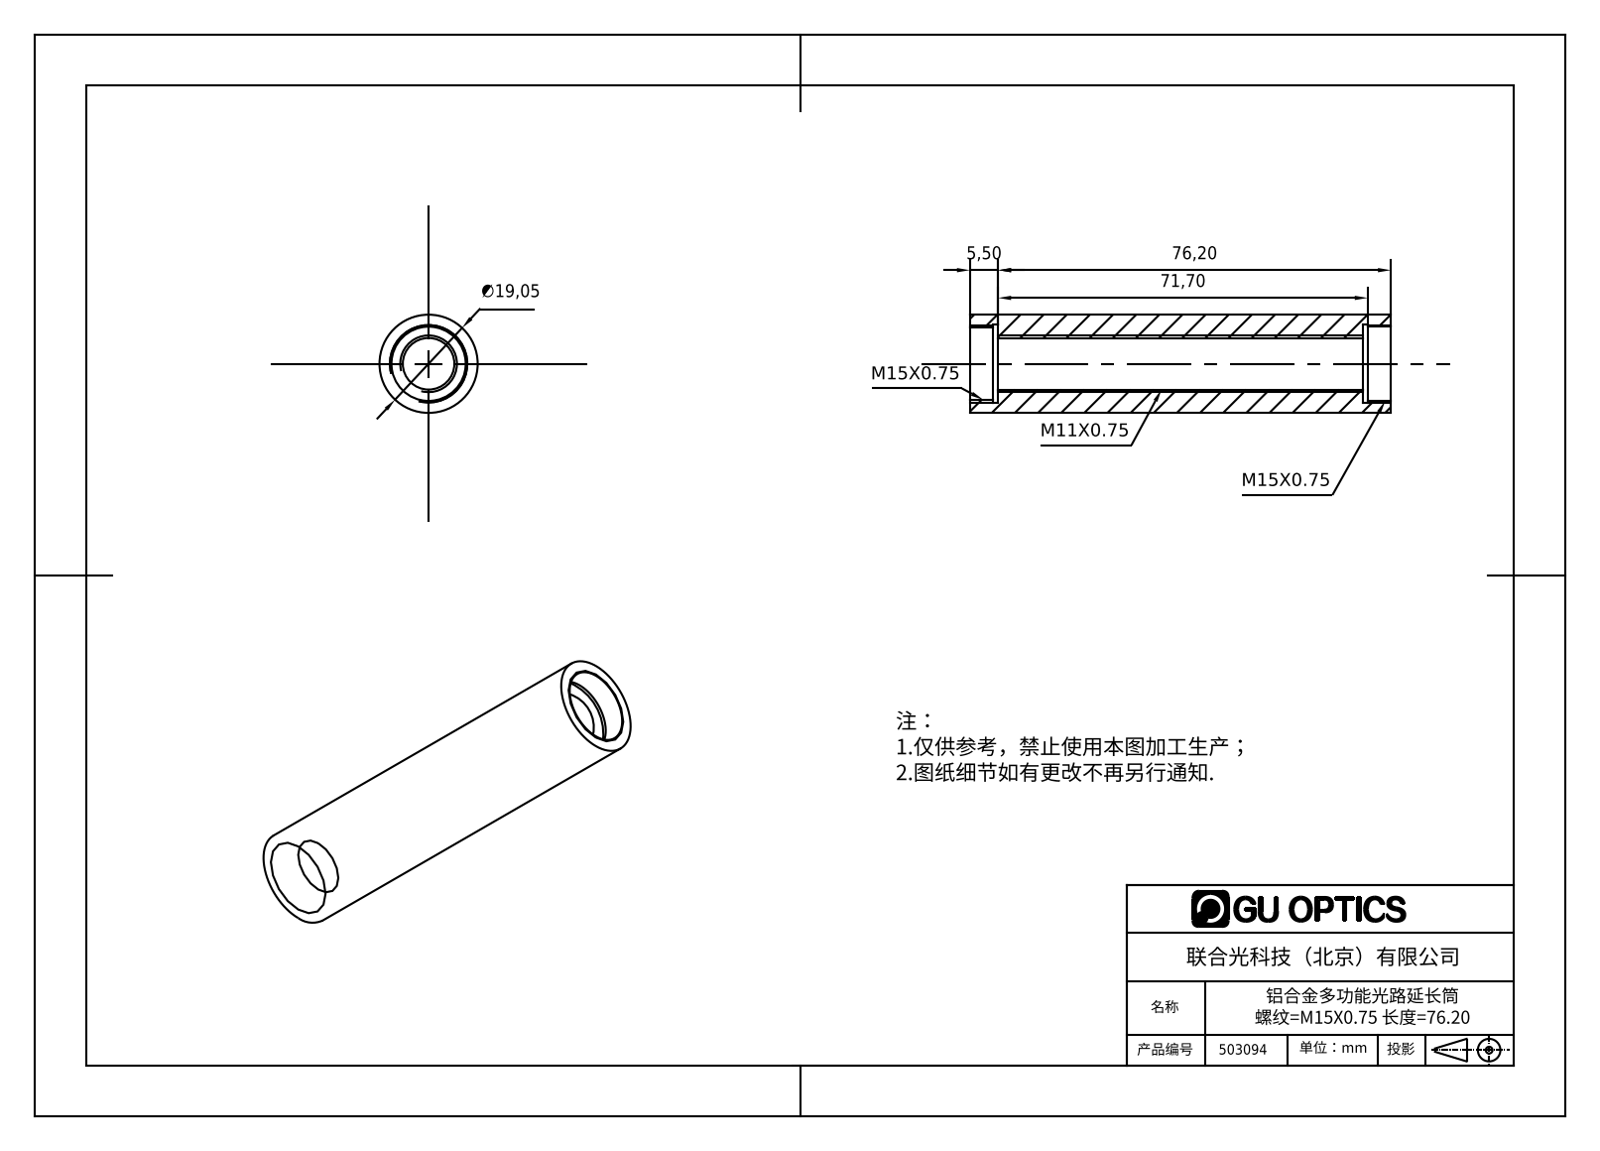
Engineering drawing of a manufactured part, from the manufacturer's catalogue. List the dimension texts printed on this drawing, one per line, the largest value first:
76,20
71,70
∅19,05
5,50
